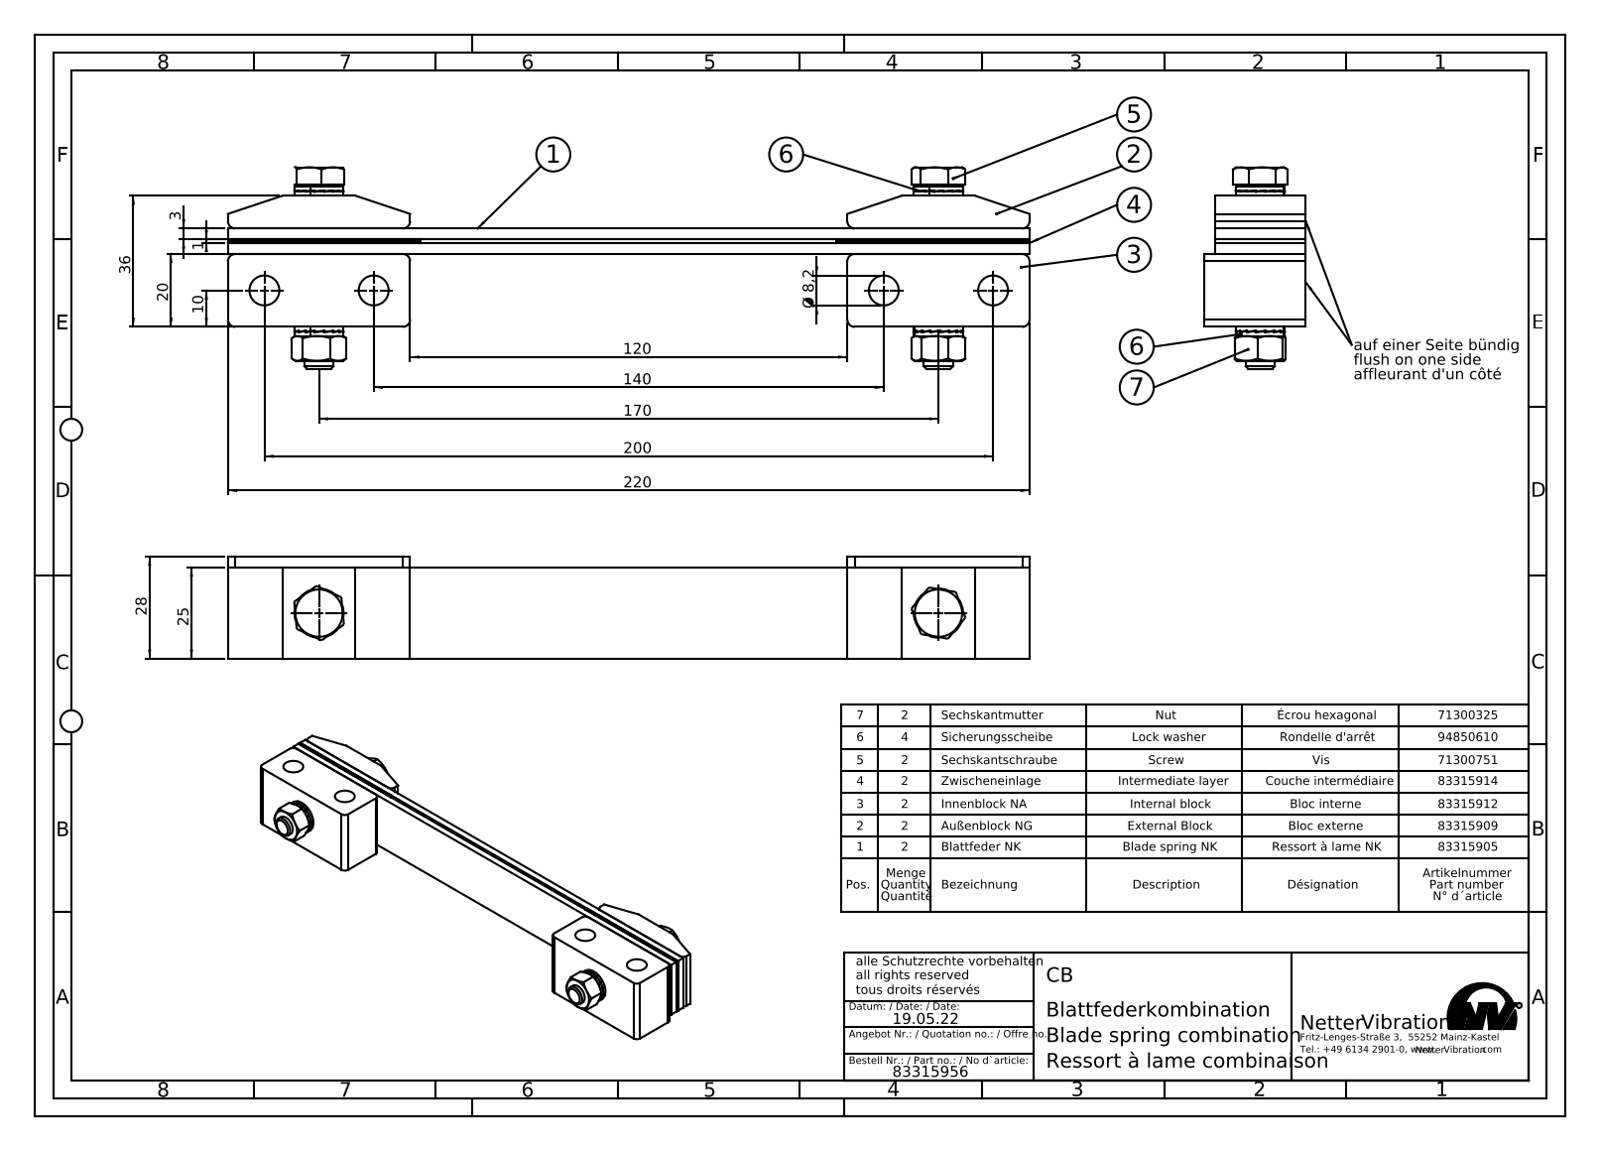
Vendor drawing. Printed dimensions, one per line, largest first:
220
200
170
140
120
36
28
25
20
10
Ø 8,2
3
1
